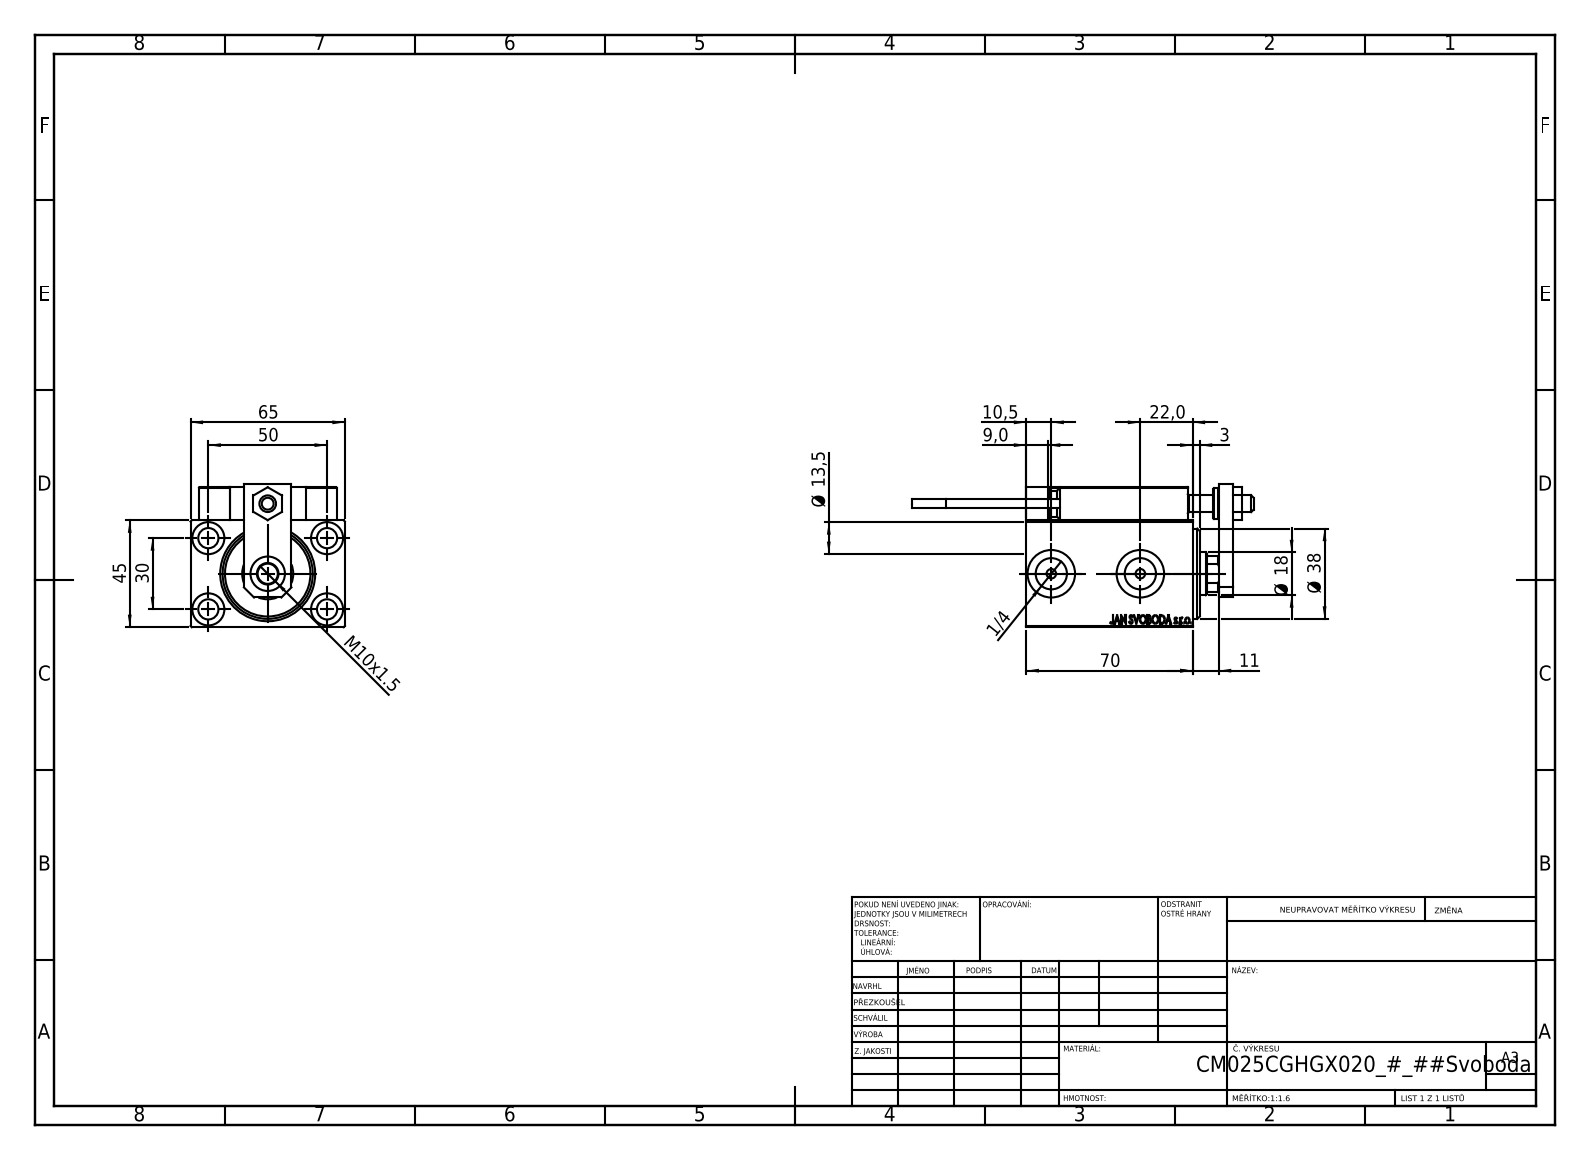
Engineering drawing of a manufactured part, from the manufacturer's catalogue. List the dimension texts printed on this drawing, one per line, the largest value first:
70
65
50
45
Ø 38
30
22,0
Ø 18
Ø 13,5
11
10,5
M10x1.5
9,0
3
1/4
